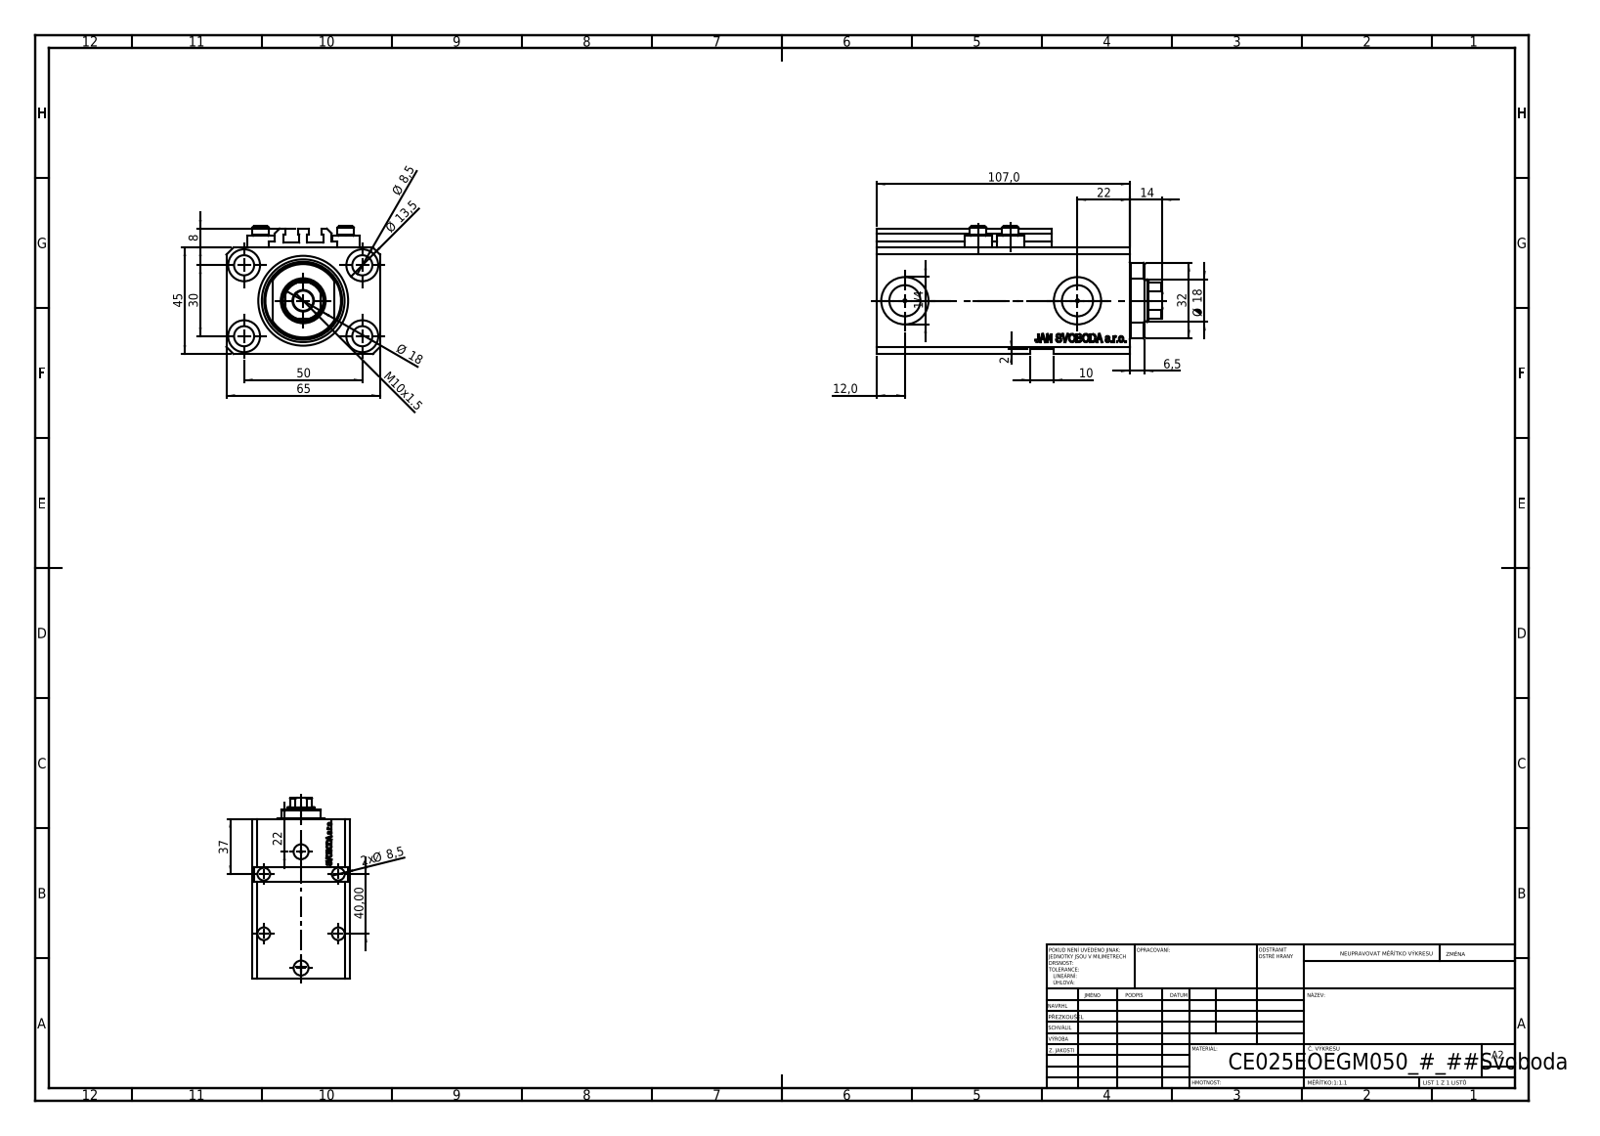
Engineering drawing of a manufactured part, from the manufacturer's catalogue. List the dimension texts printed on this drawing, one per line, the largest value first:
107,0
65
50
45
40,00
37
32
30
22
22
Ø 18
Ø 18
14
Ø 13,5
12,0
M10x1.5
10
Ø 8,5
2x Ø 8,5
8
6,5
2
1/4
